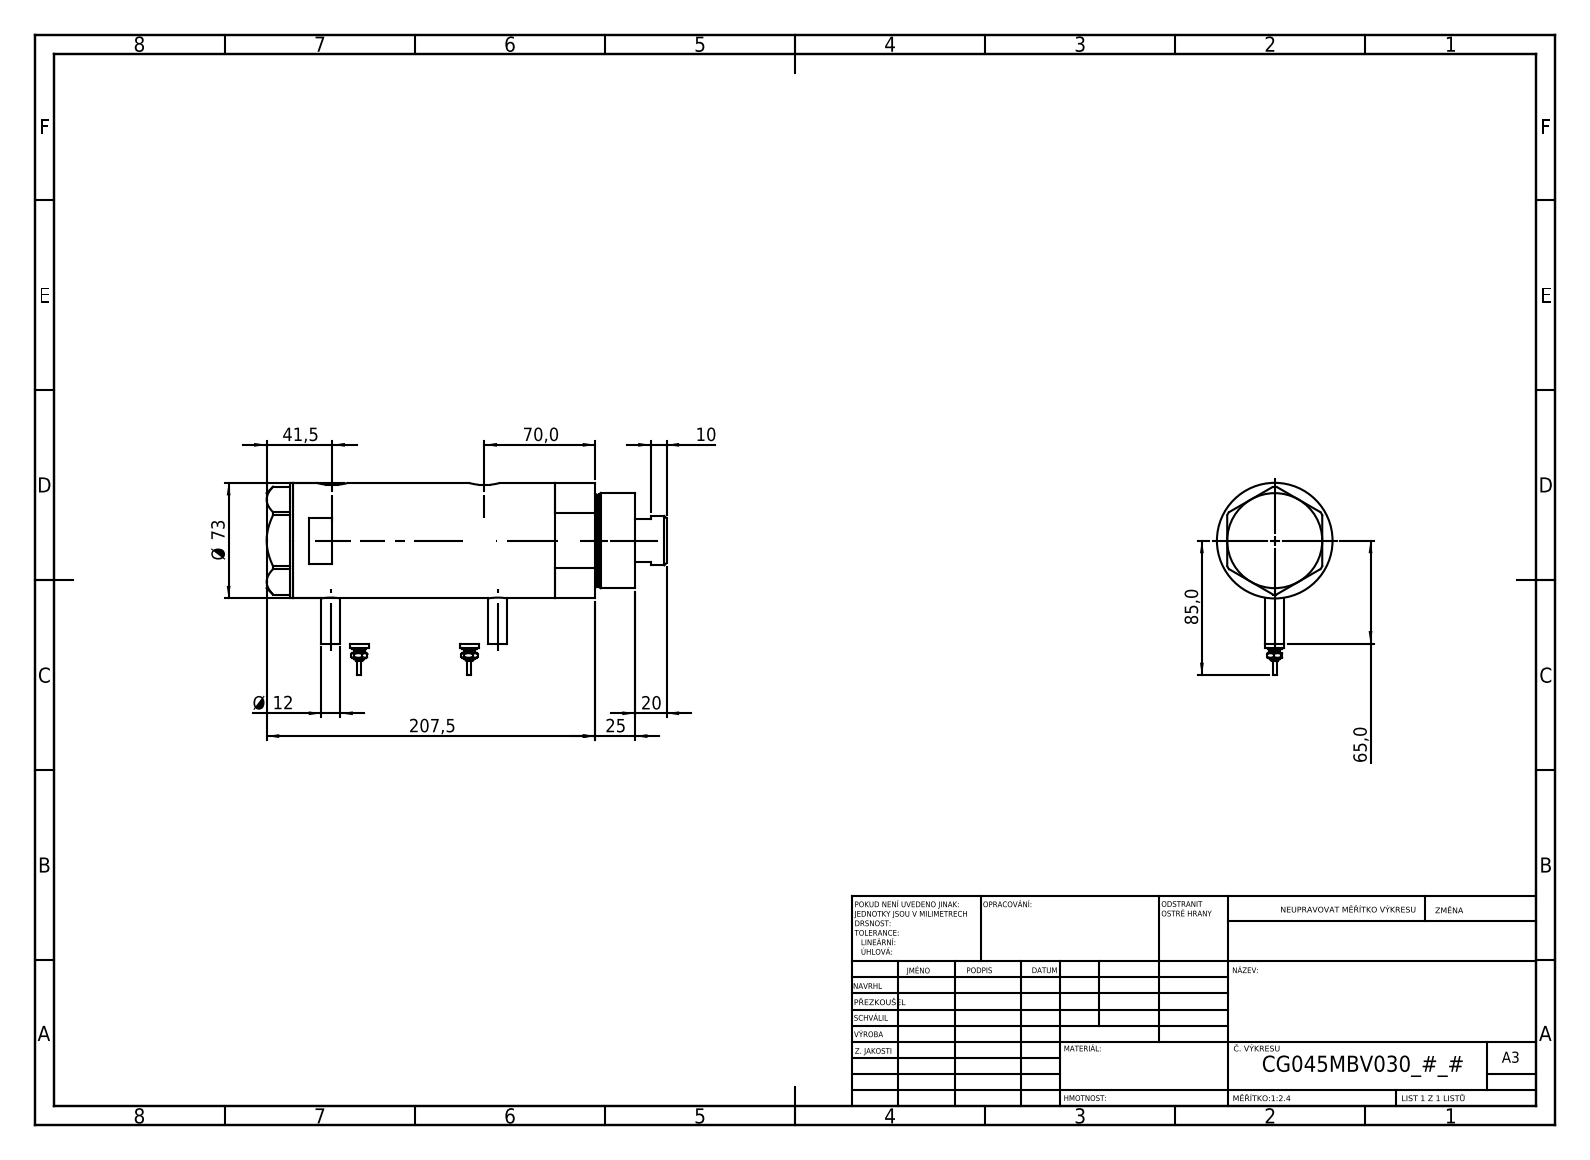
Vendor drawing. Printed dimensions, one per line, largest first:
207,5
85,0
Ø 73
70,0
65,0
41,5
25
20
Ø 12
10
